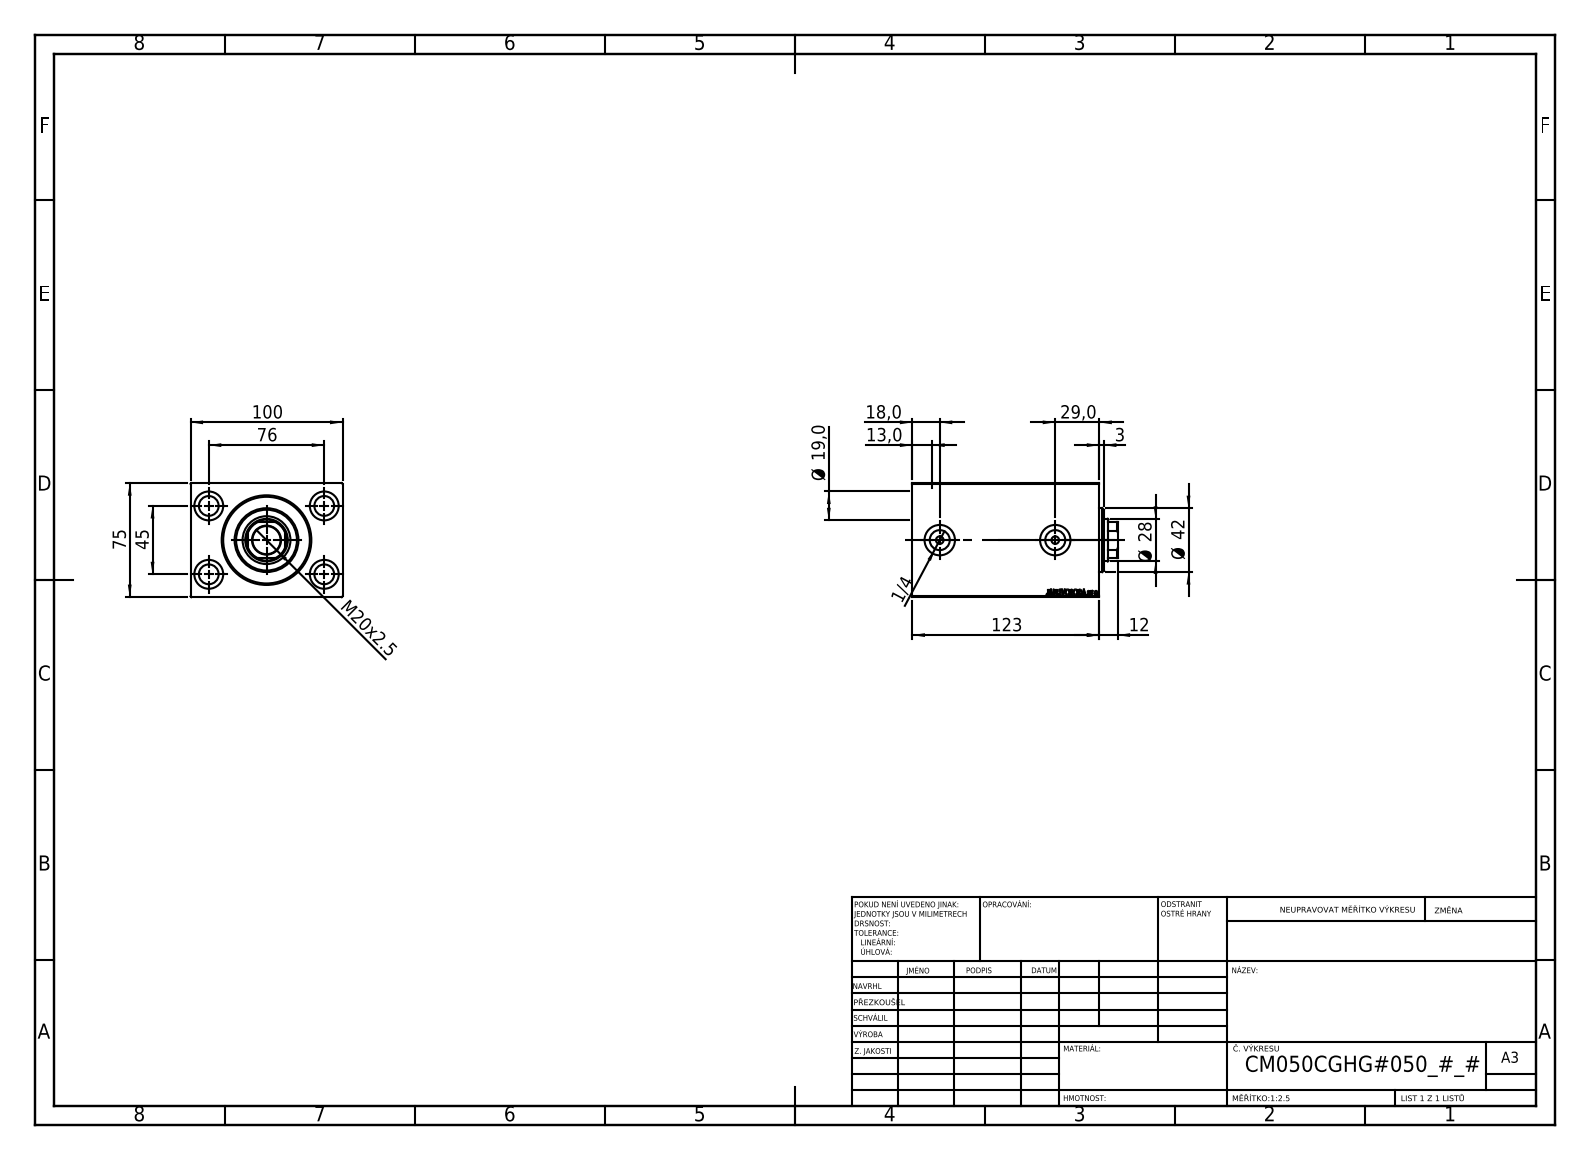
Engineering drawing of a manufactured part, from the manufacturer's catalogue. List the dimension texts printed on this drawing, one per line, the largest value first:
123
100
76
75
45
Ø 42
29,0
Ø 28
M20x2.5
Ø 19,0
18,0
13,0
12
3
1/4
